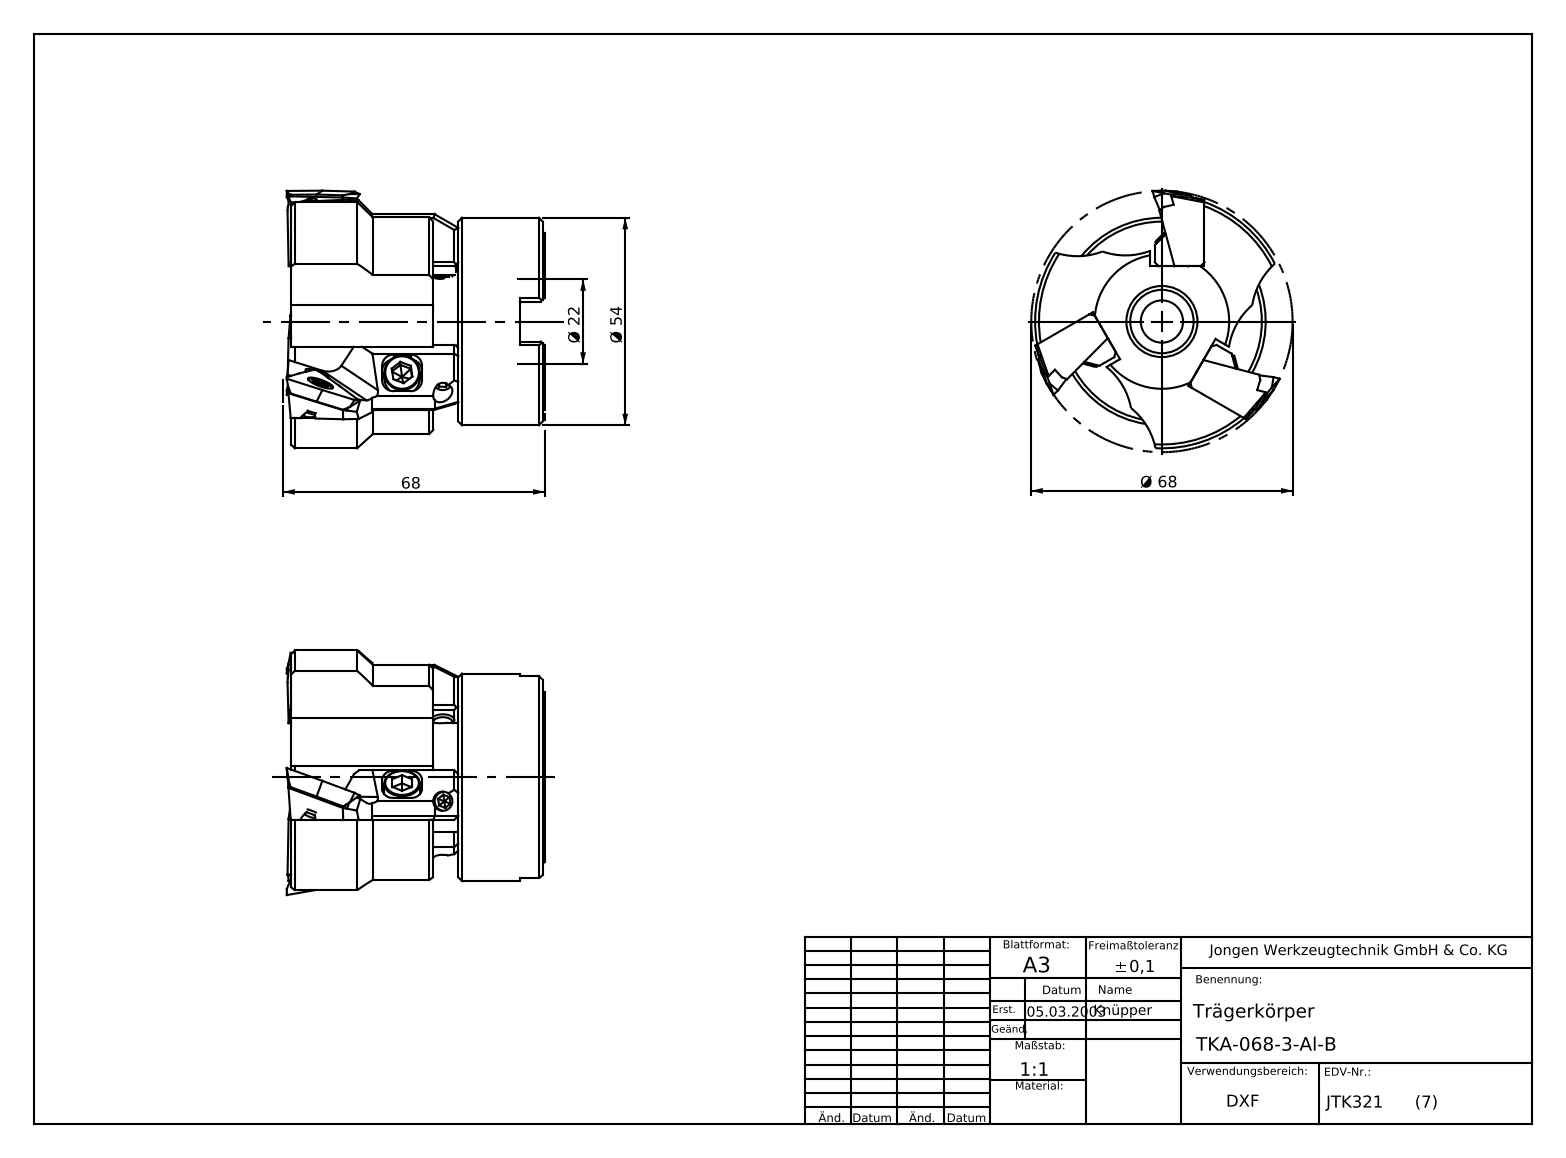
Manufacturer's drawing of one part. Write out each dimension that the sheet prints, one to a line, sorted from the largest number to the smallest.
Ø 68
68
Ø 54
Ø 22
